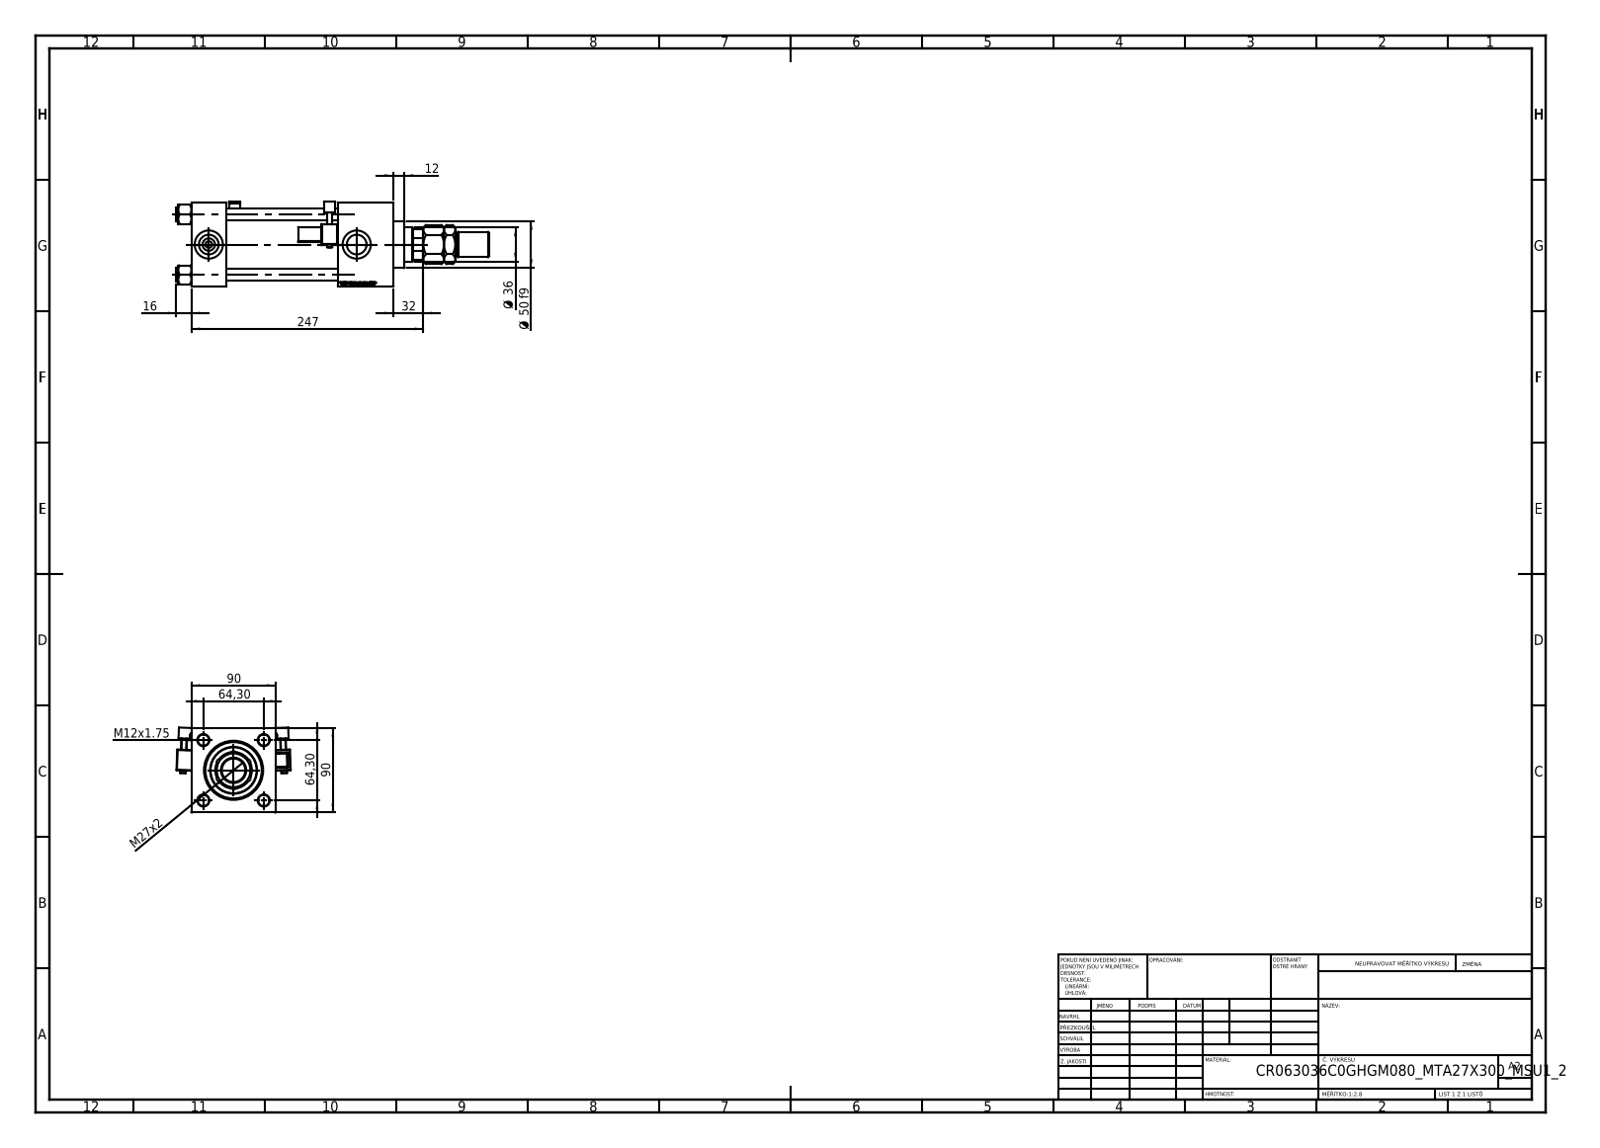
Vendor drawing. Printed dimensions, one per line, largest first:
247
90
90
64,30
64,30
Ø 50 f9
Ø 36
32
M27x2
16
12
M12x1.75
